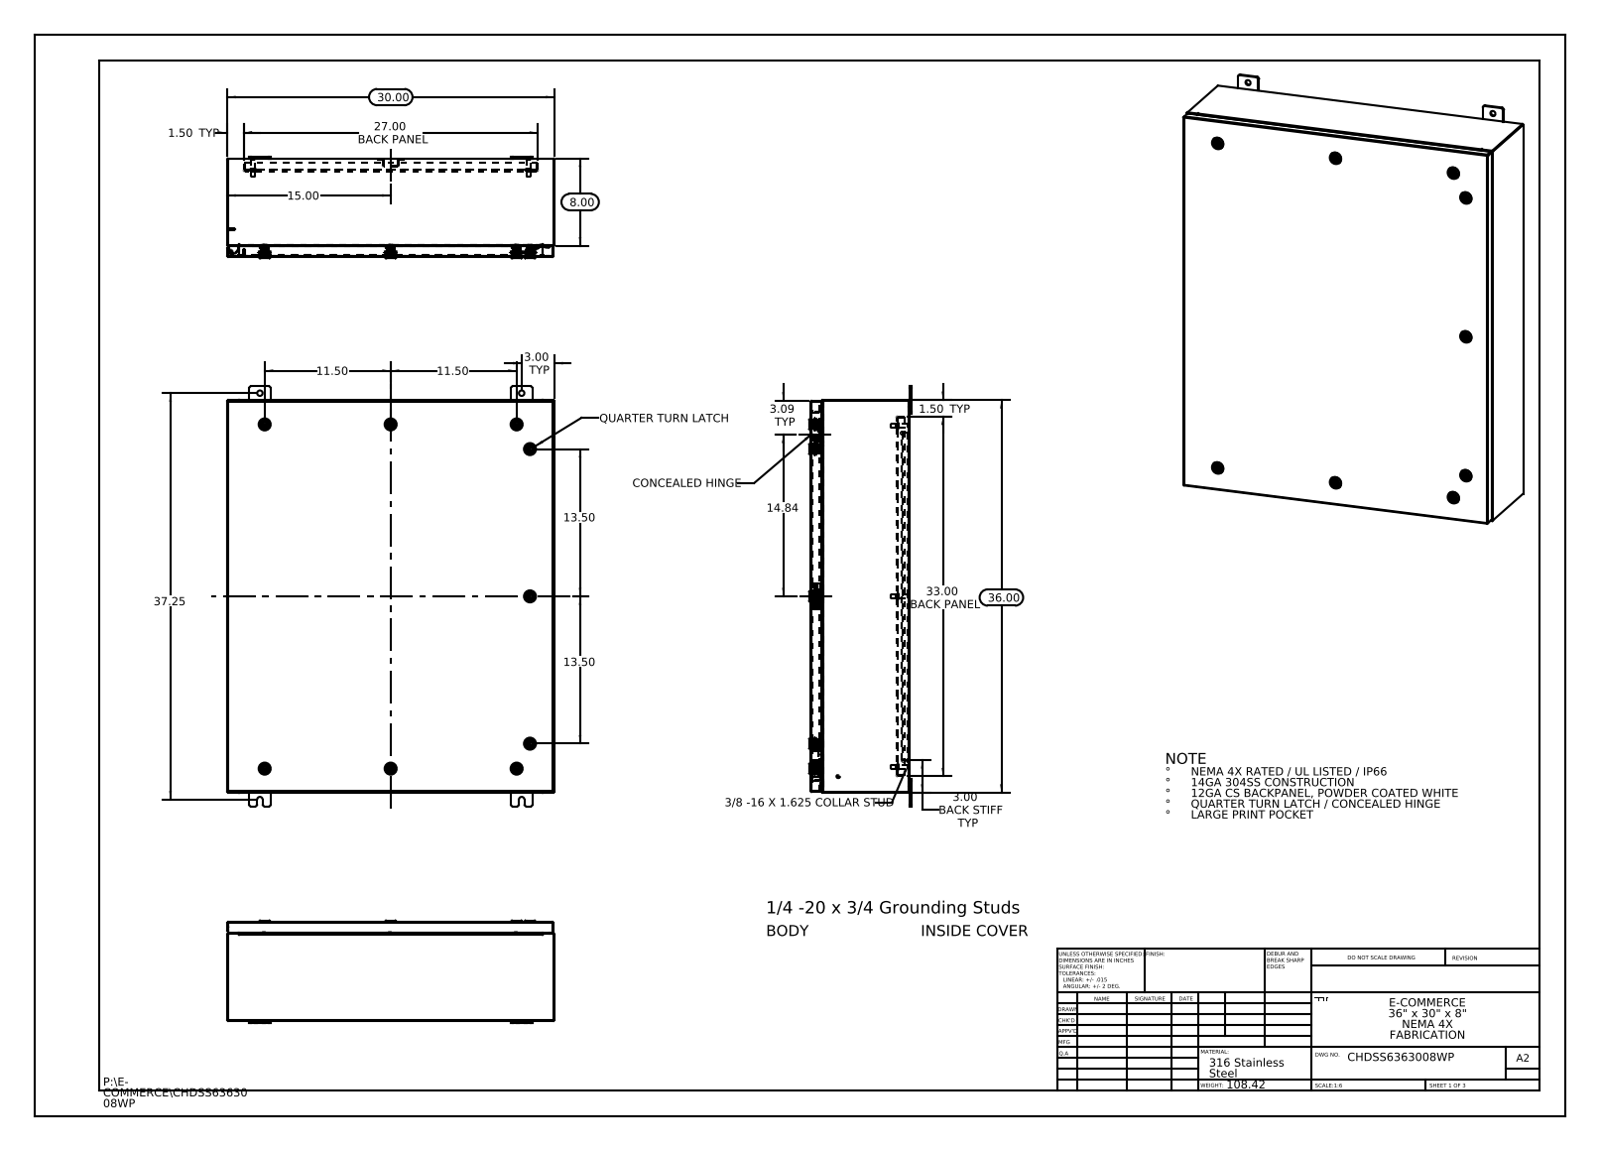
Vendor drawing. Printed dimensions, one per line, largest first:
37.25
36.00
33.00 BACK PANEL
30.00
27.00 BACK PANEL
15.00
14.84
13.50
13.50
11.50
11.50
8.00
3.09 TYP
3.00 TYP
3.00 BACK STIFF TYP
1.50 TYP
1.50 TYP
